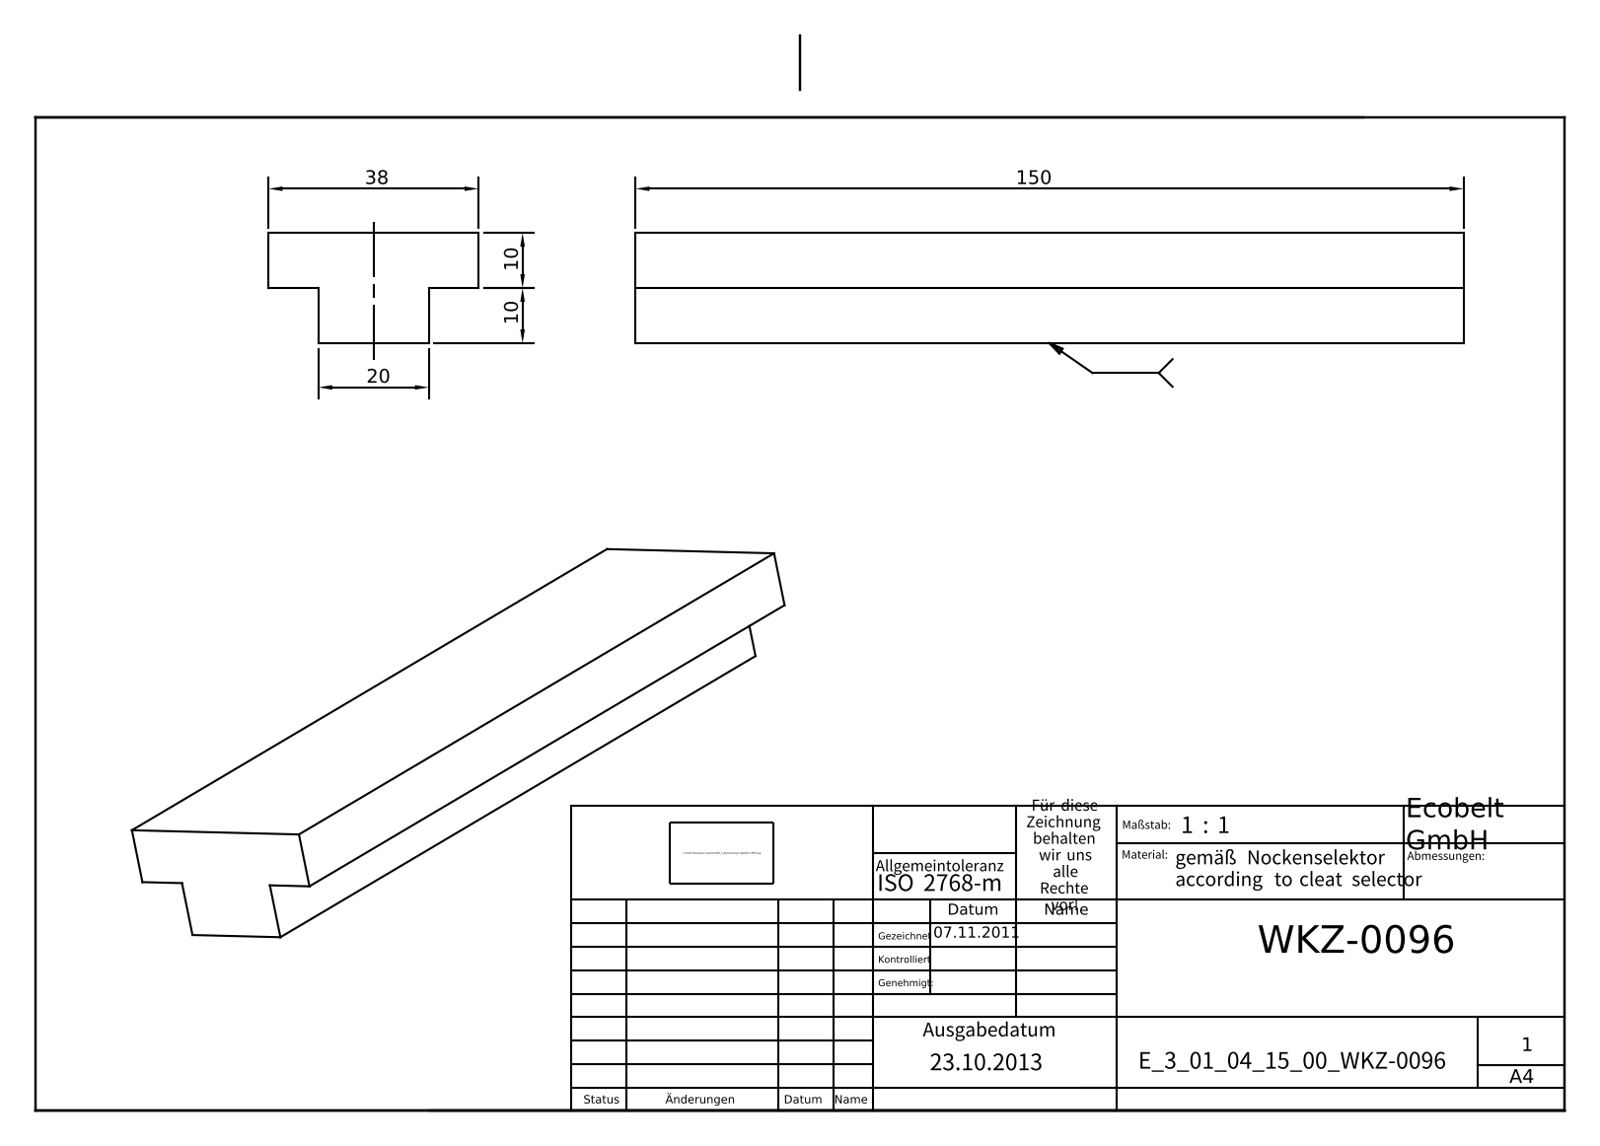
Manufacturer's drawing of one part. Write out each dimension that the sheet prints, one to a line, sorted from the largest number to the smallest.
150
38
20
10
10
